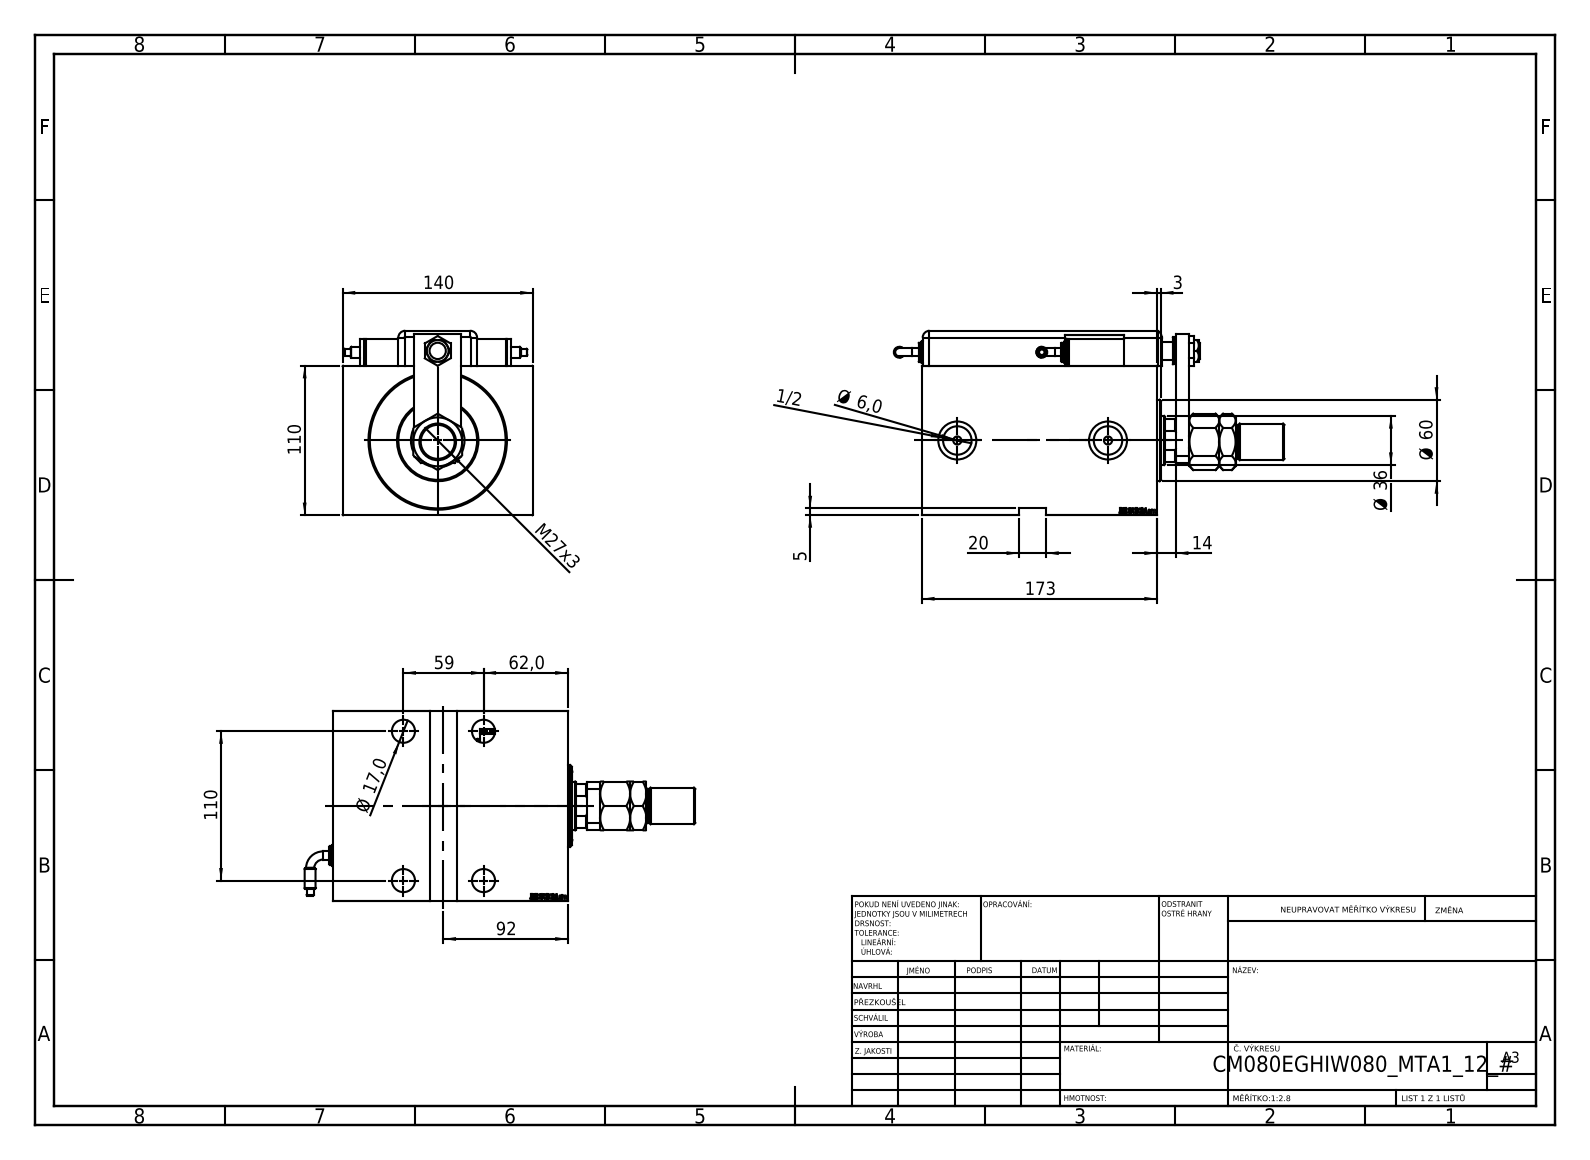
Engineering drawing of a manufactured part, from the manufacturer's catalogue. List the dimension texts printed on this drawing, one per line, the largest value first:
173
140
110
110
92
62,0
Ø 60
59
Ø 36
M27x3
20
Ø 17,0
14
Ø 6,0
5
3
1/2
